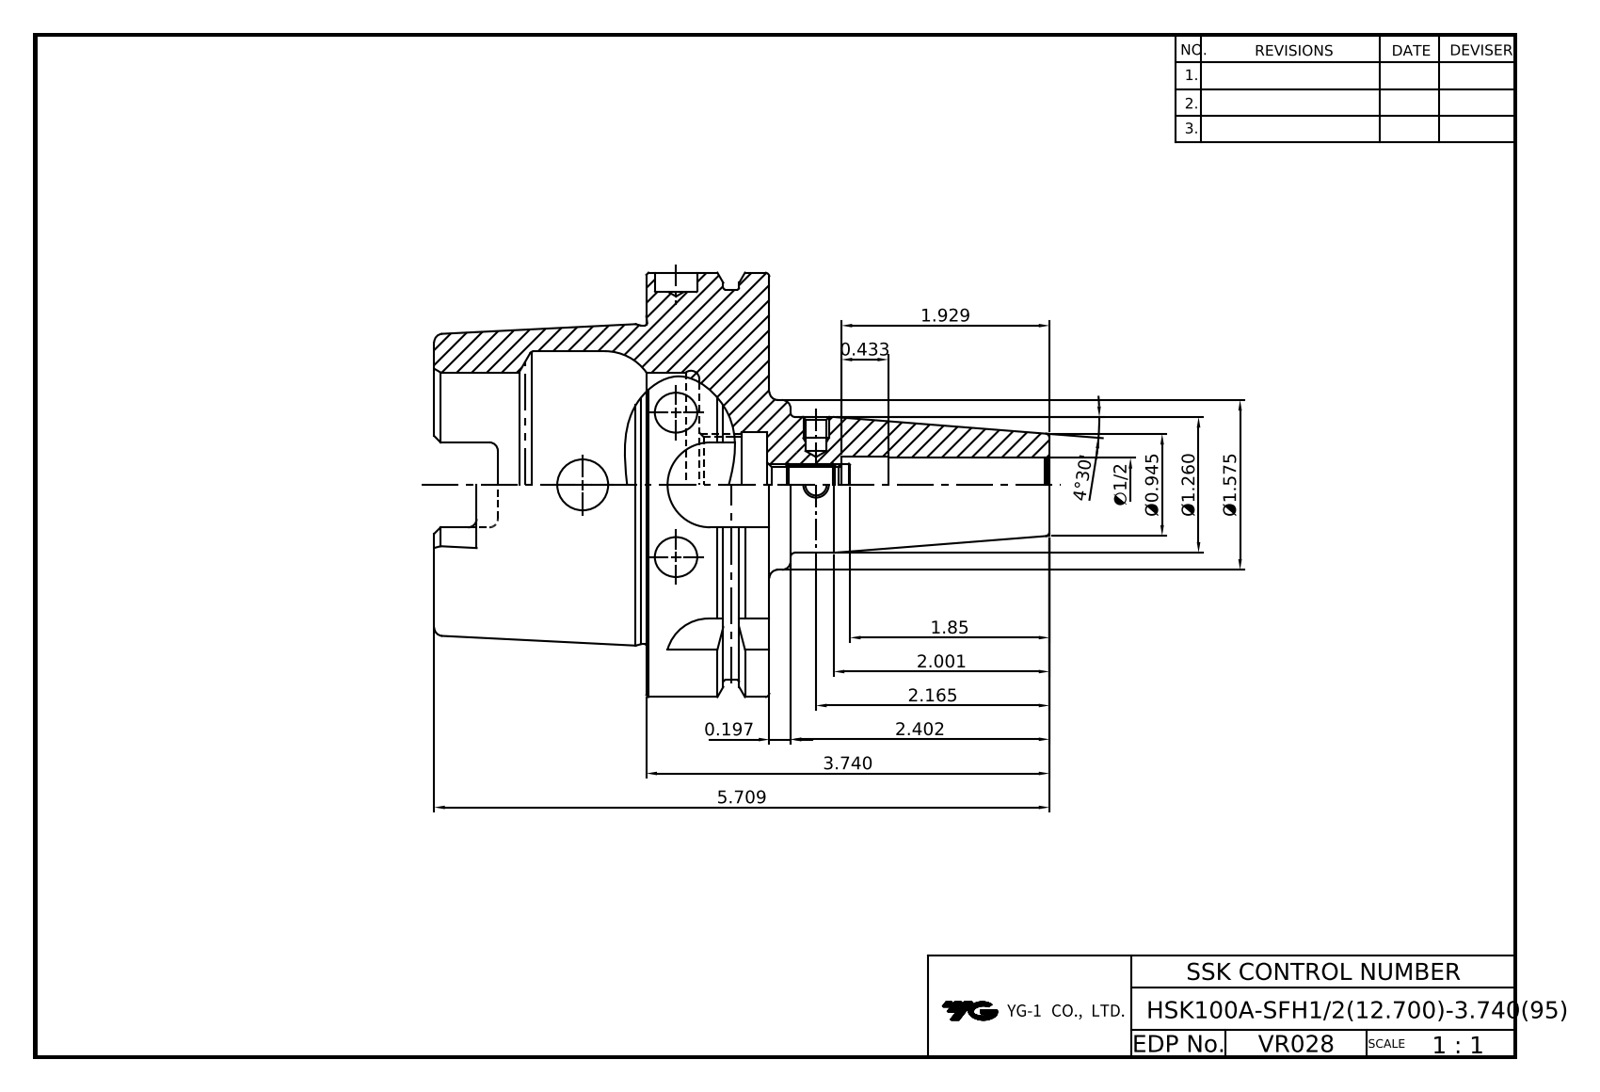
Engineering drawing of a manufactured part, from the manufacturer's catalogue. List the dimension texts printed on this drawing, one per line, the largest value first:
5.709
4°30'
3.740
2.402
2.165
2.001
1.929
1.85
Ø1.575
Ø1.260
Ø0.945
0.433
0.197
